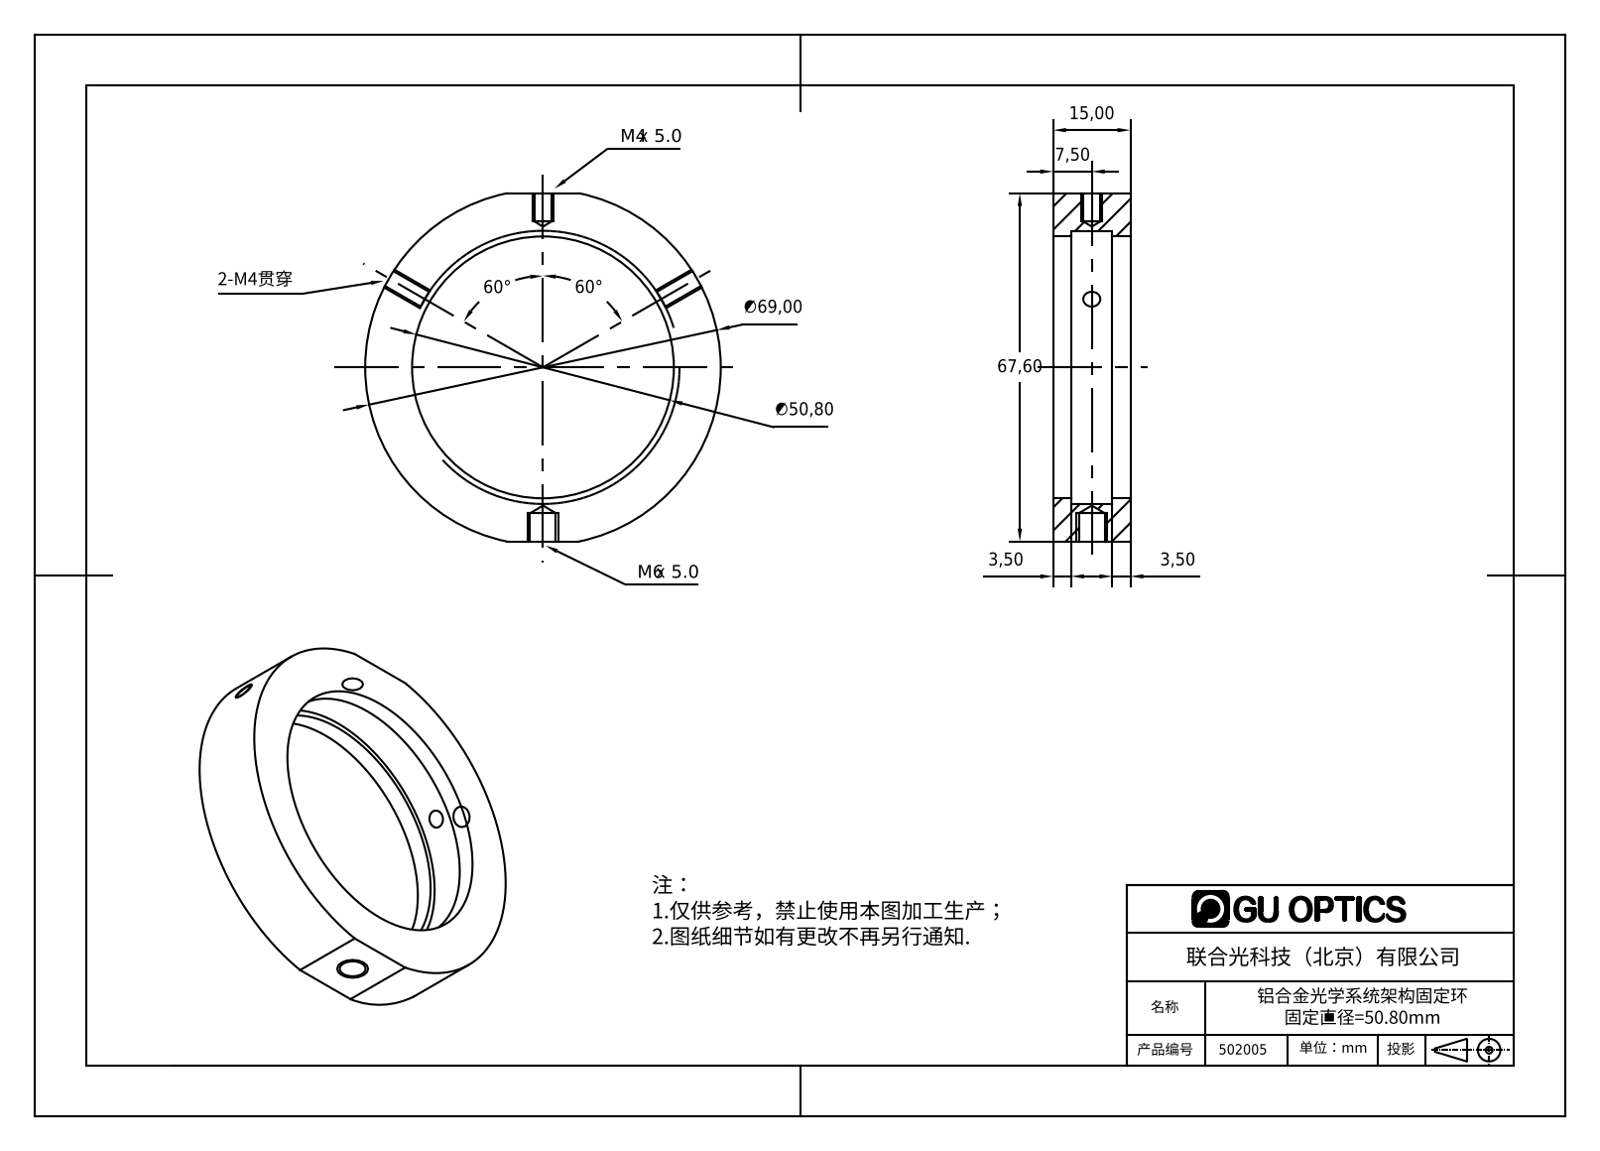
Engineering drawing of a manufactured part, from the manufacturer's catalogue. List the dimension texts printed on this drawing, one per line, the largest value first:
∅69,00
67,60
60°
60°
∅50,80
15,00
7,50
3,50
3,50
